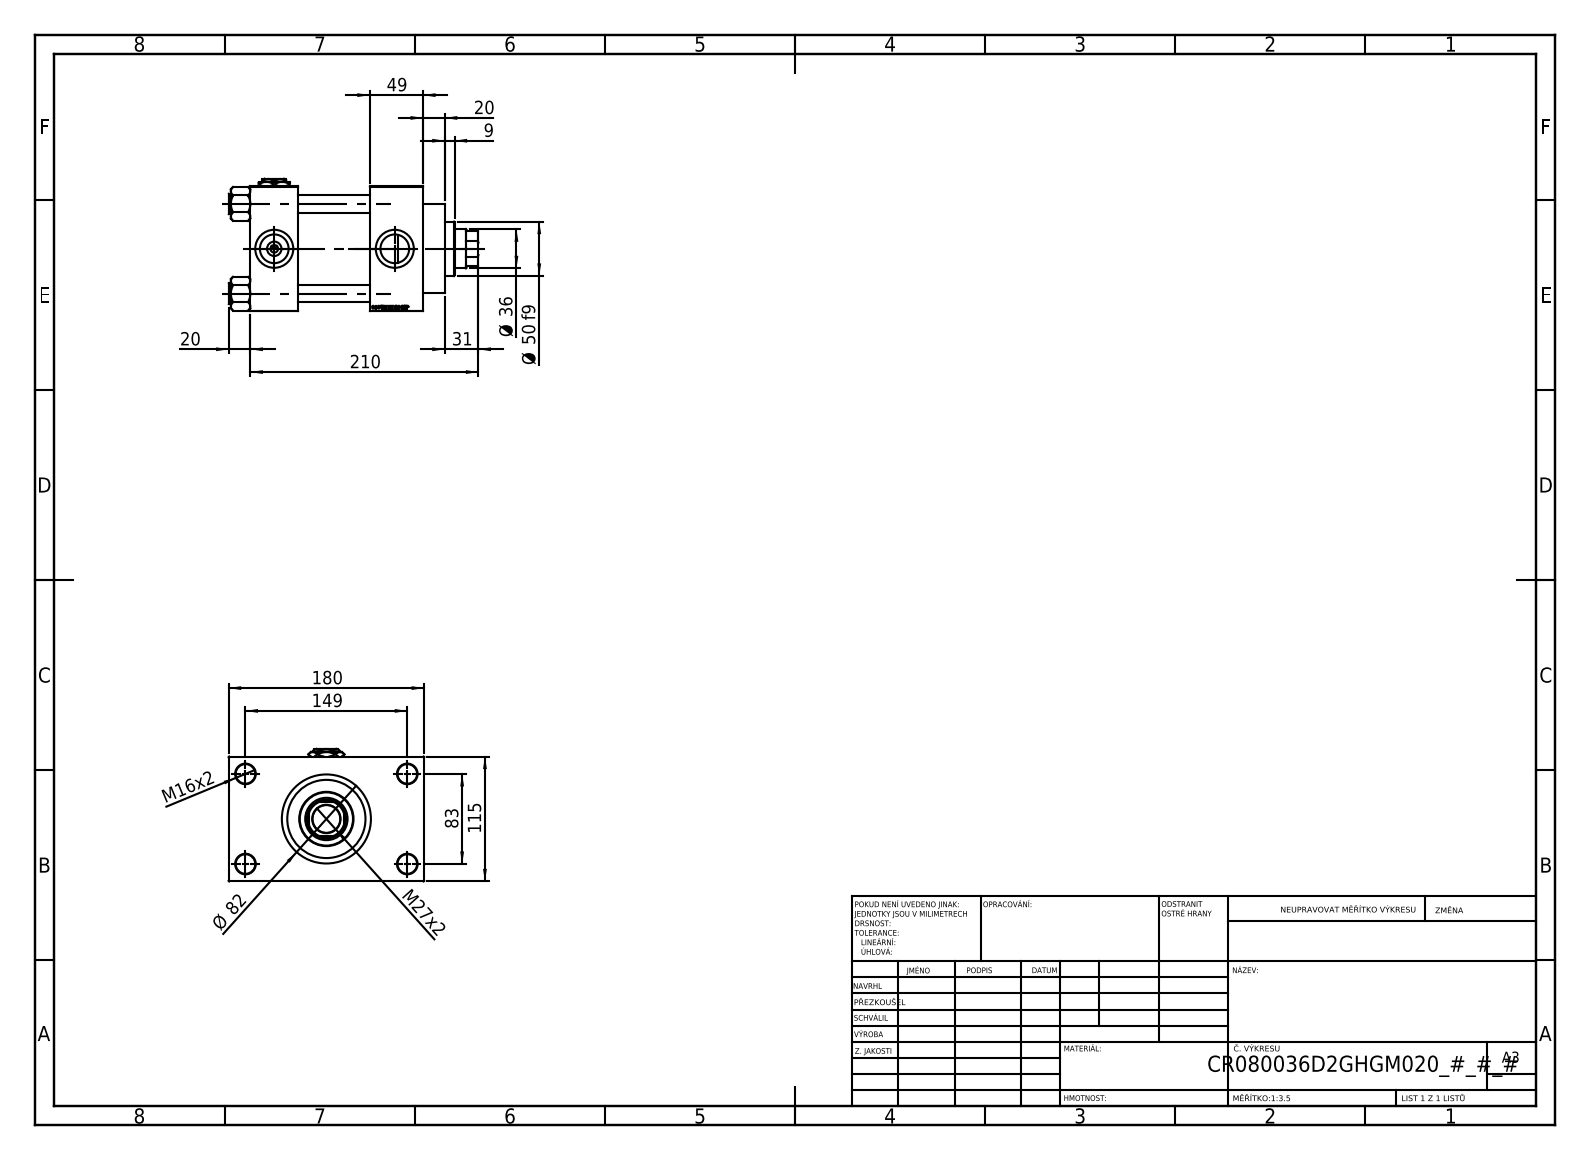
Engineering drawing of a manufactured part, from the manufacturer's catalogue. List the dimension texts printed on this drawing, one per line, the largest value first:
210
180
149
115
83
Ø 82
Ø 50 f9
49
Ø 36
31
M27x2
20
20
M16x2
9
